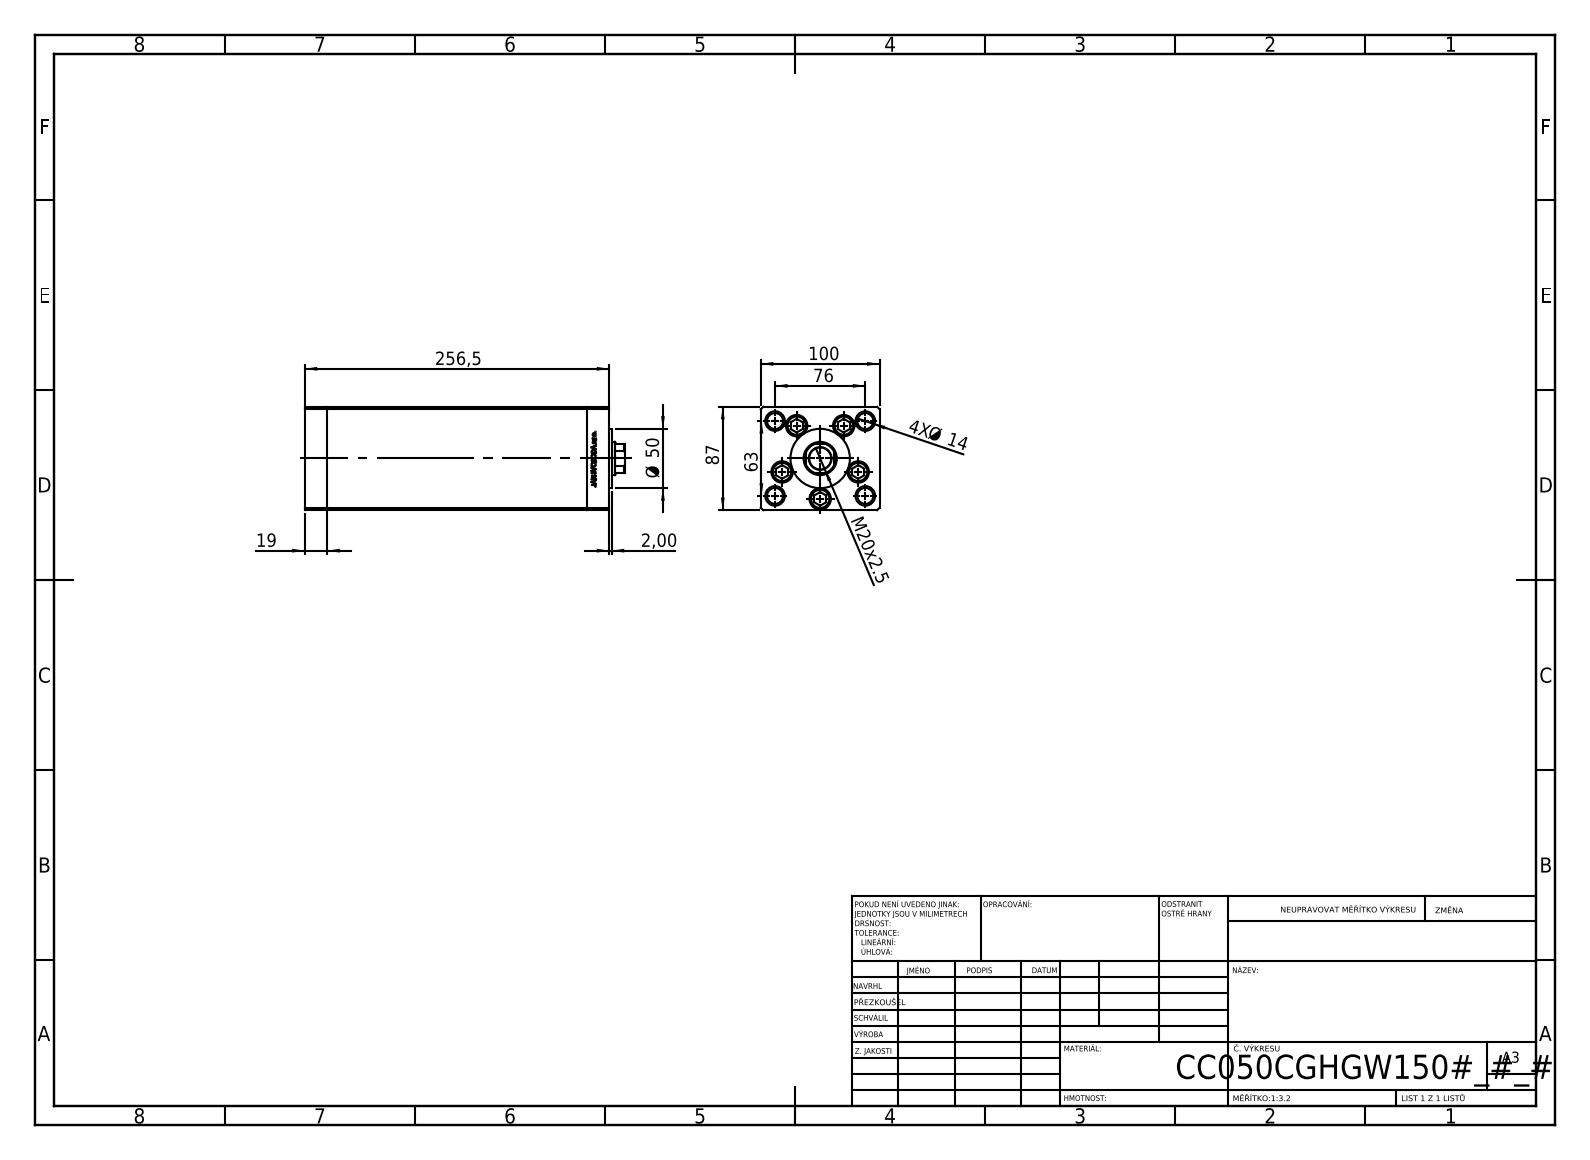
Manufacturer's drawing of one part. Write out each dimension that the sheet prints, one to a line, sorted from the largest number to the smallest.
256,5
100
87
76
63
Ø 50
M20x2.5
19
4X Ø 14
2,00
